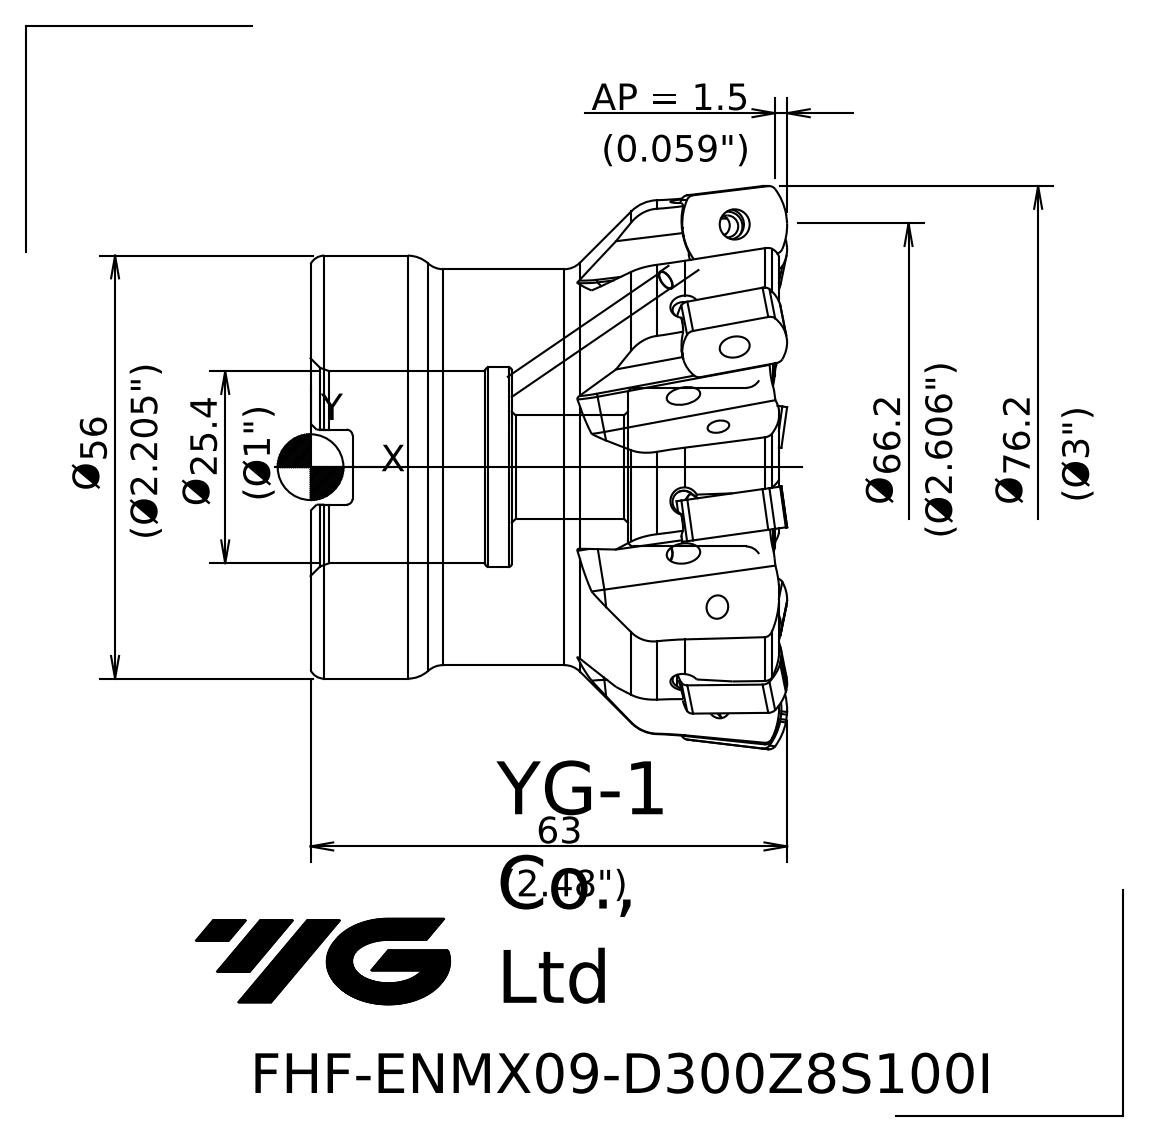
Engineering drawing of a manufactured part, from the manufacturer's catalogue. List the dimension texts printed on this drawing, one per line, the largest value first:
76.2 Ø
66.2 Ø
25.4 Ø
AP = 1.5
